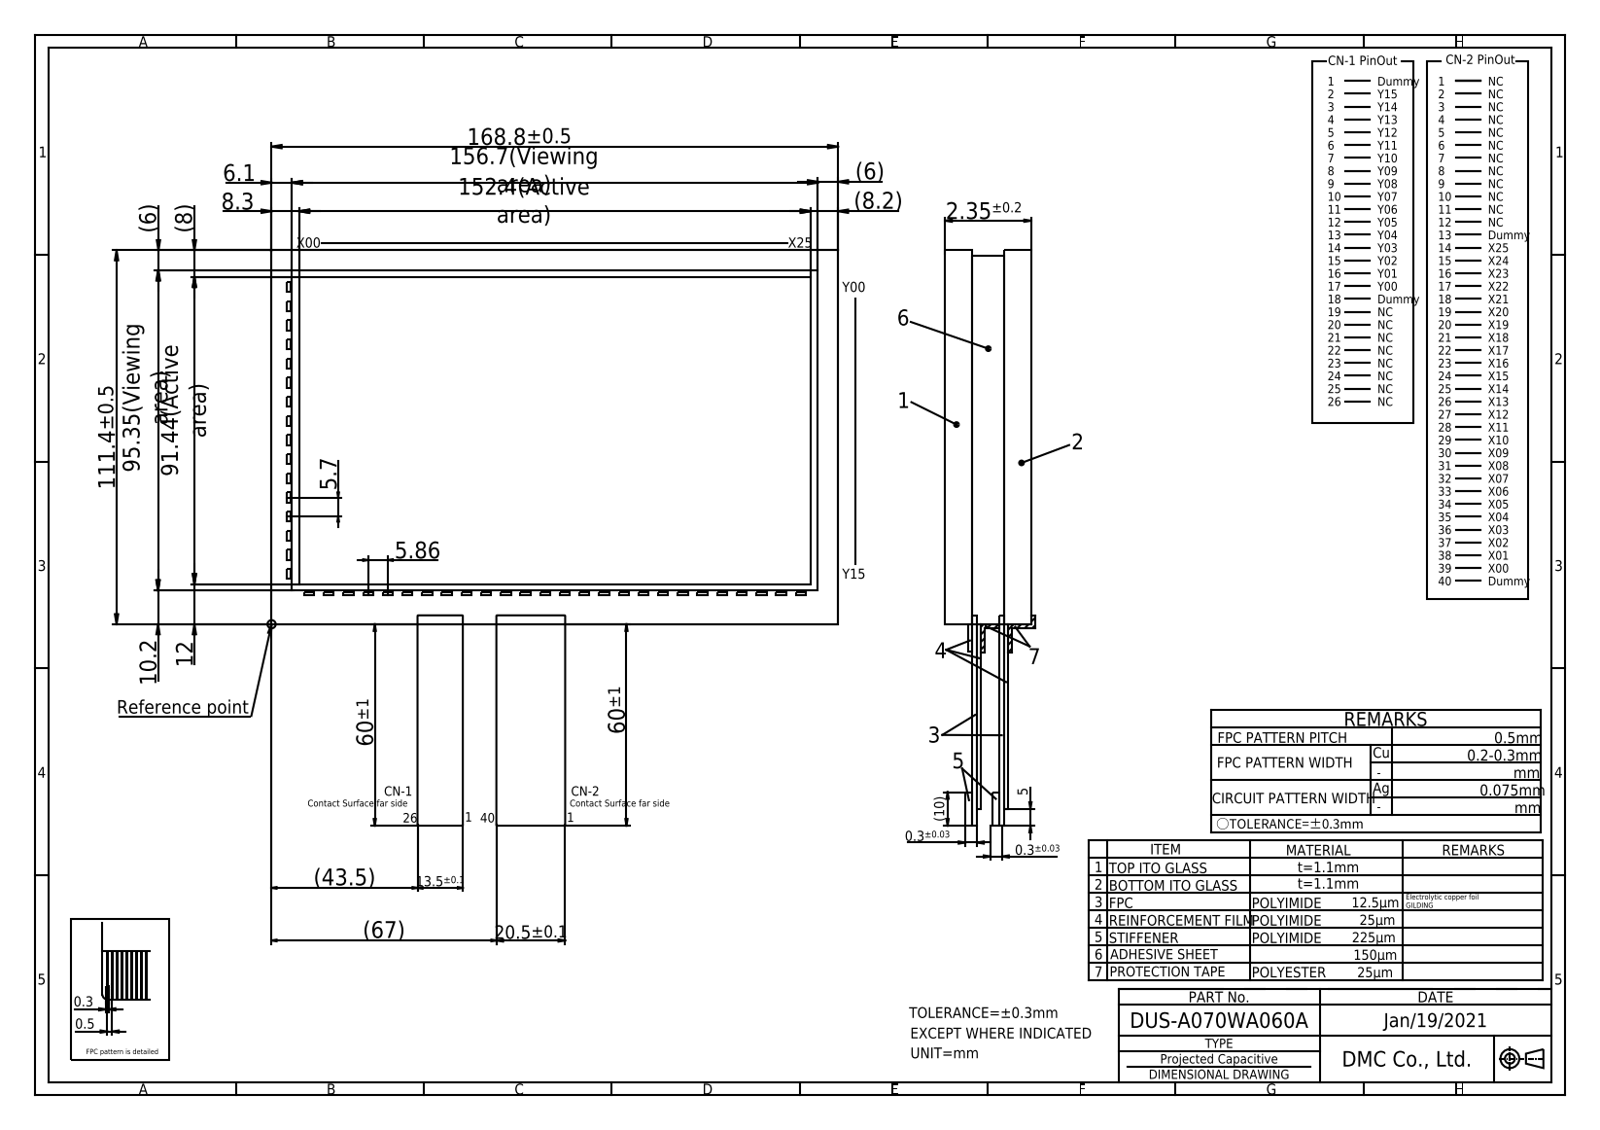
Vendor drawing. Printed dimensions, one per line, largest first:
168.8±0.5
156.7(Viewing area)
152.4(Active area)
111.4±0.5
95.35(Viewing area)
91.44(Active area)
(67)
60±1
60±1
(43.5)
20.5±0.1
13.5±0.1
12
10.2
(10)
8.3
(8.2)
(8)
6.1
(6)
(6)
5.86
5.7
5
2.35±0.2
0.5
0.3±0.03
0.3±0.03
0.3
